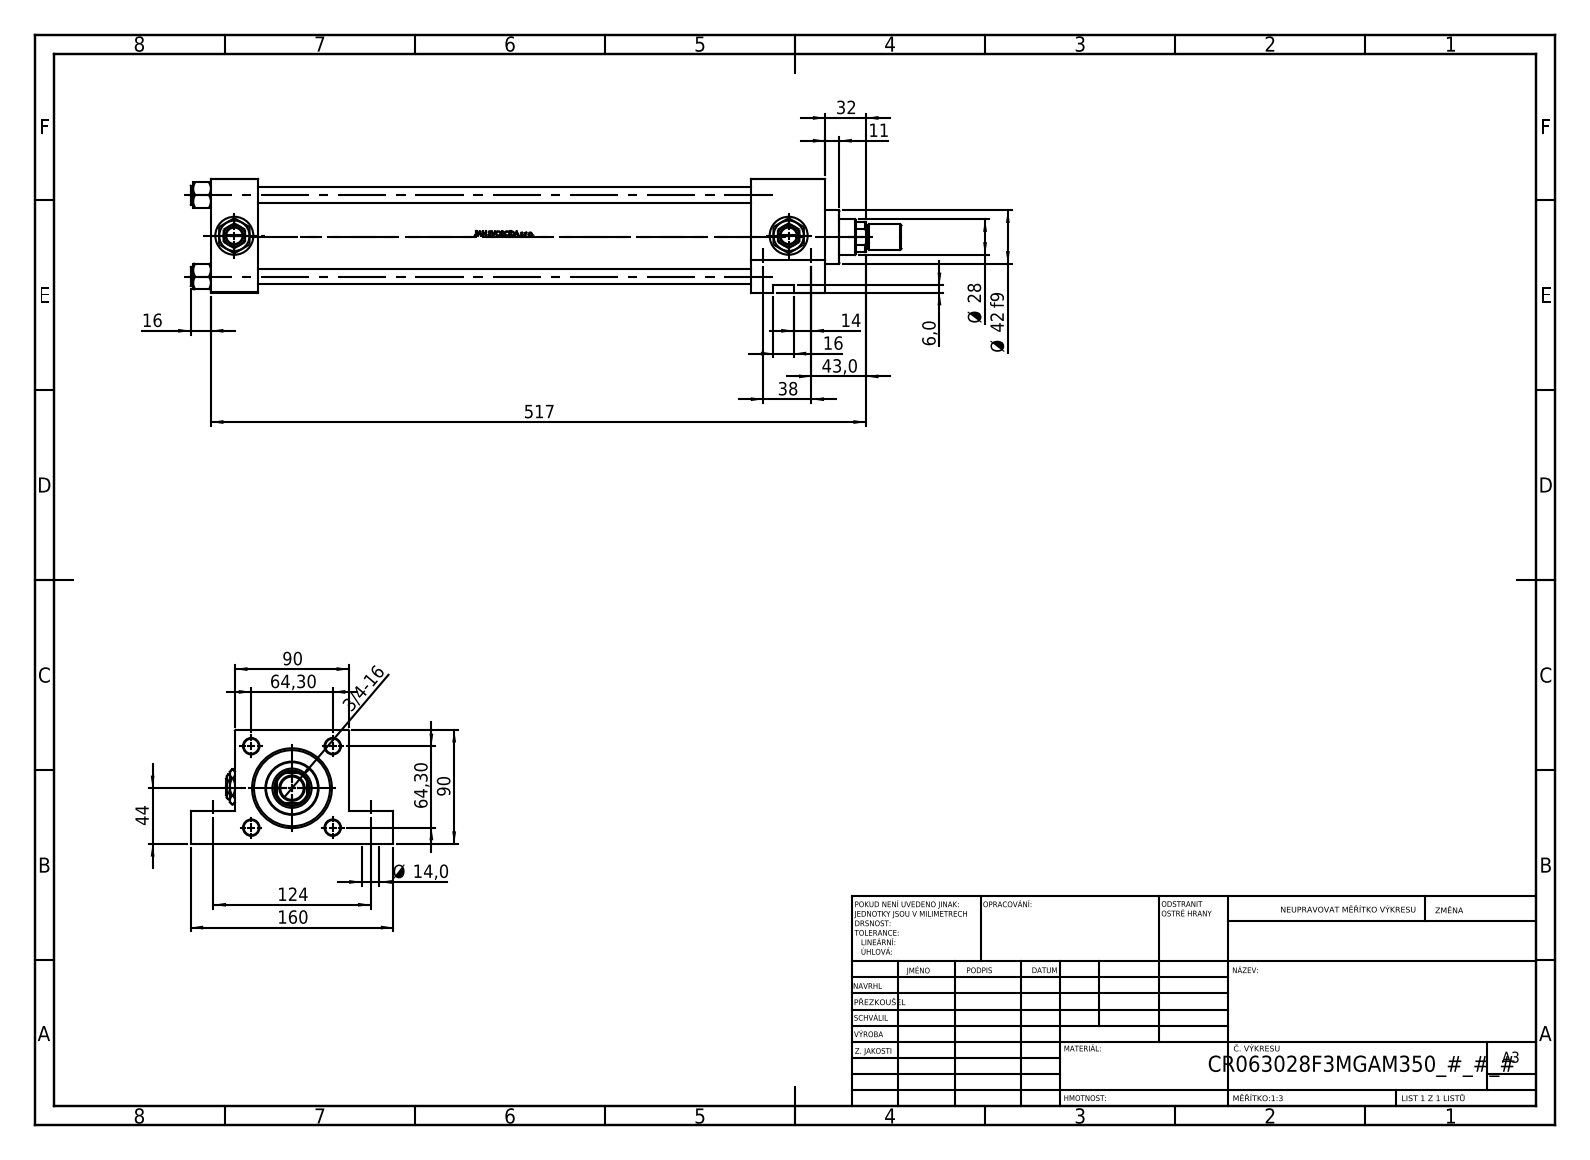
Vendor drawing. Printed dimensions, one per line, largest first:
517
160
124
90
90
64,30
64,30
44
43,0
Ø 42 f9
38
32
Ø 28
16
16
14
Ø 14,0
11
6,0
3/4-16
